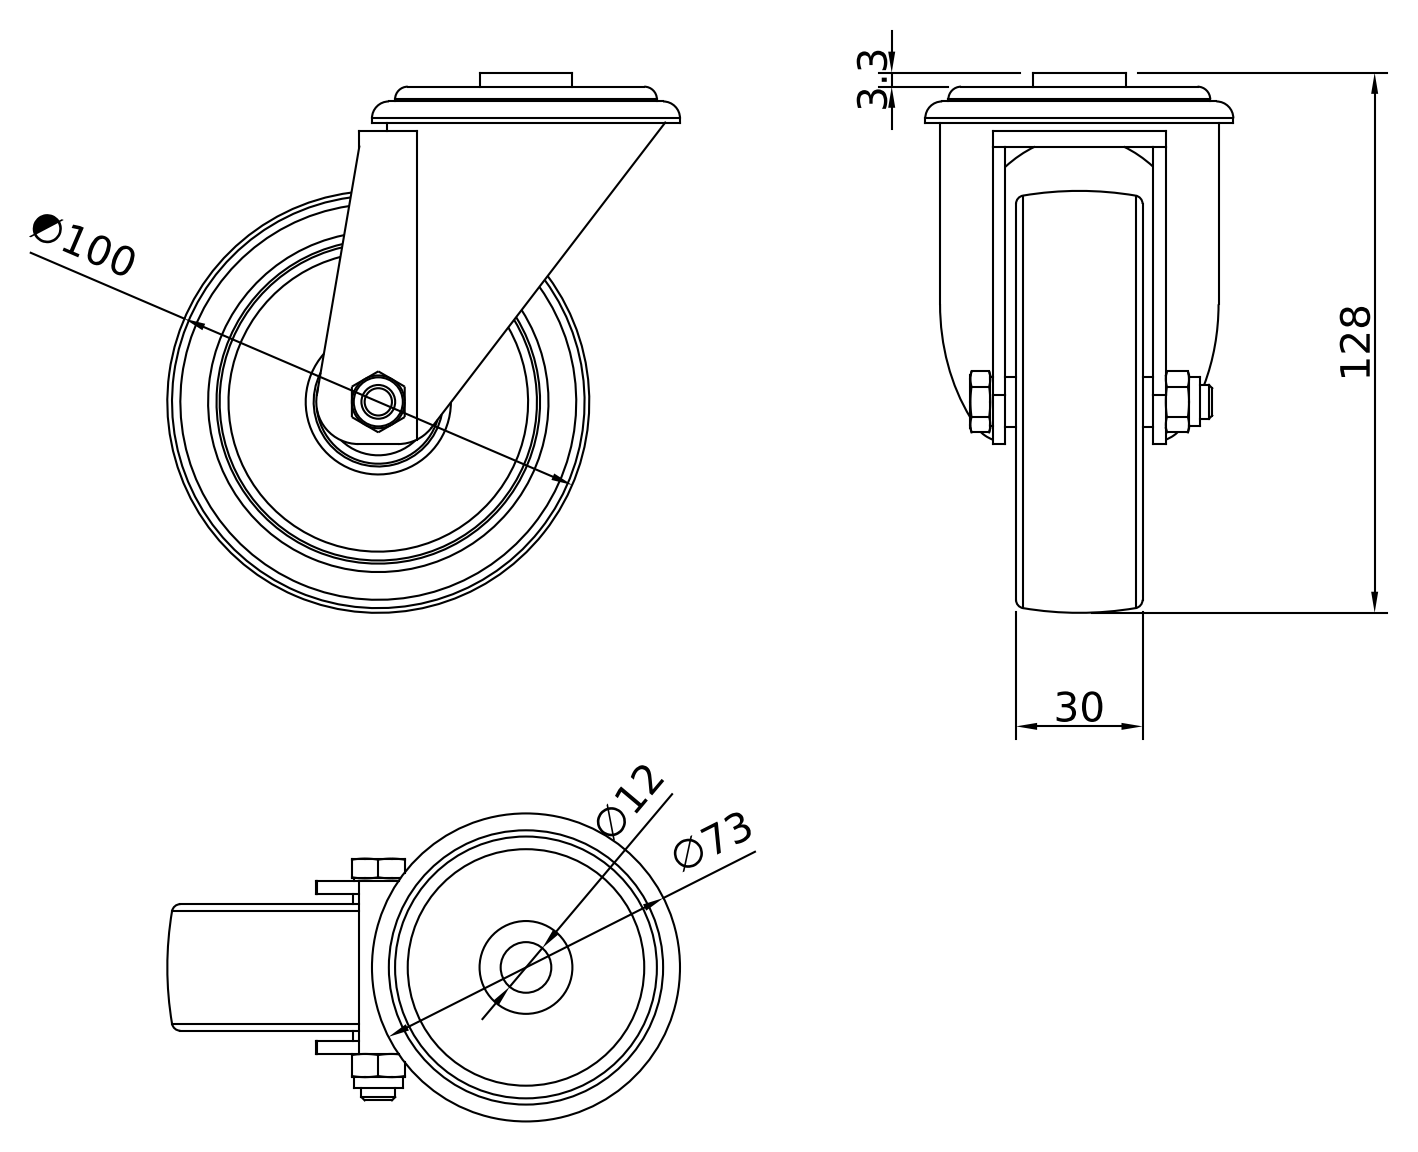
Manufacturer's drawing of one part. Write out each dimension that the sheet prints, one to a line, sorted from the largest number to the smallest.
128
∅100
∅73
30
∅12
3.3
